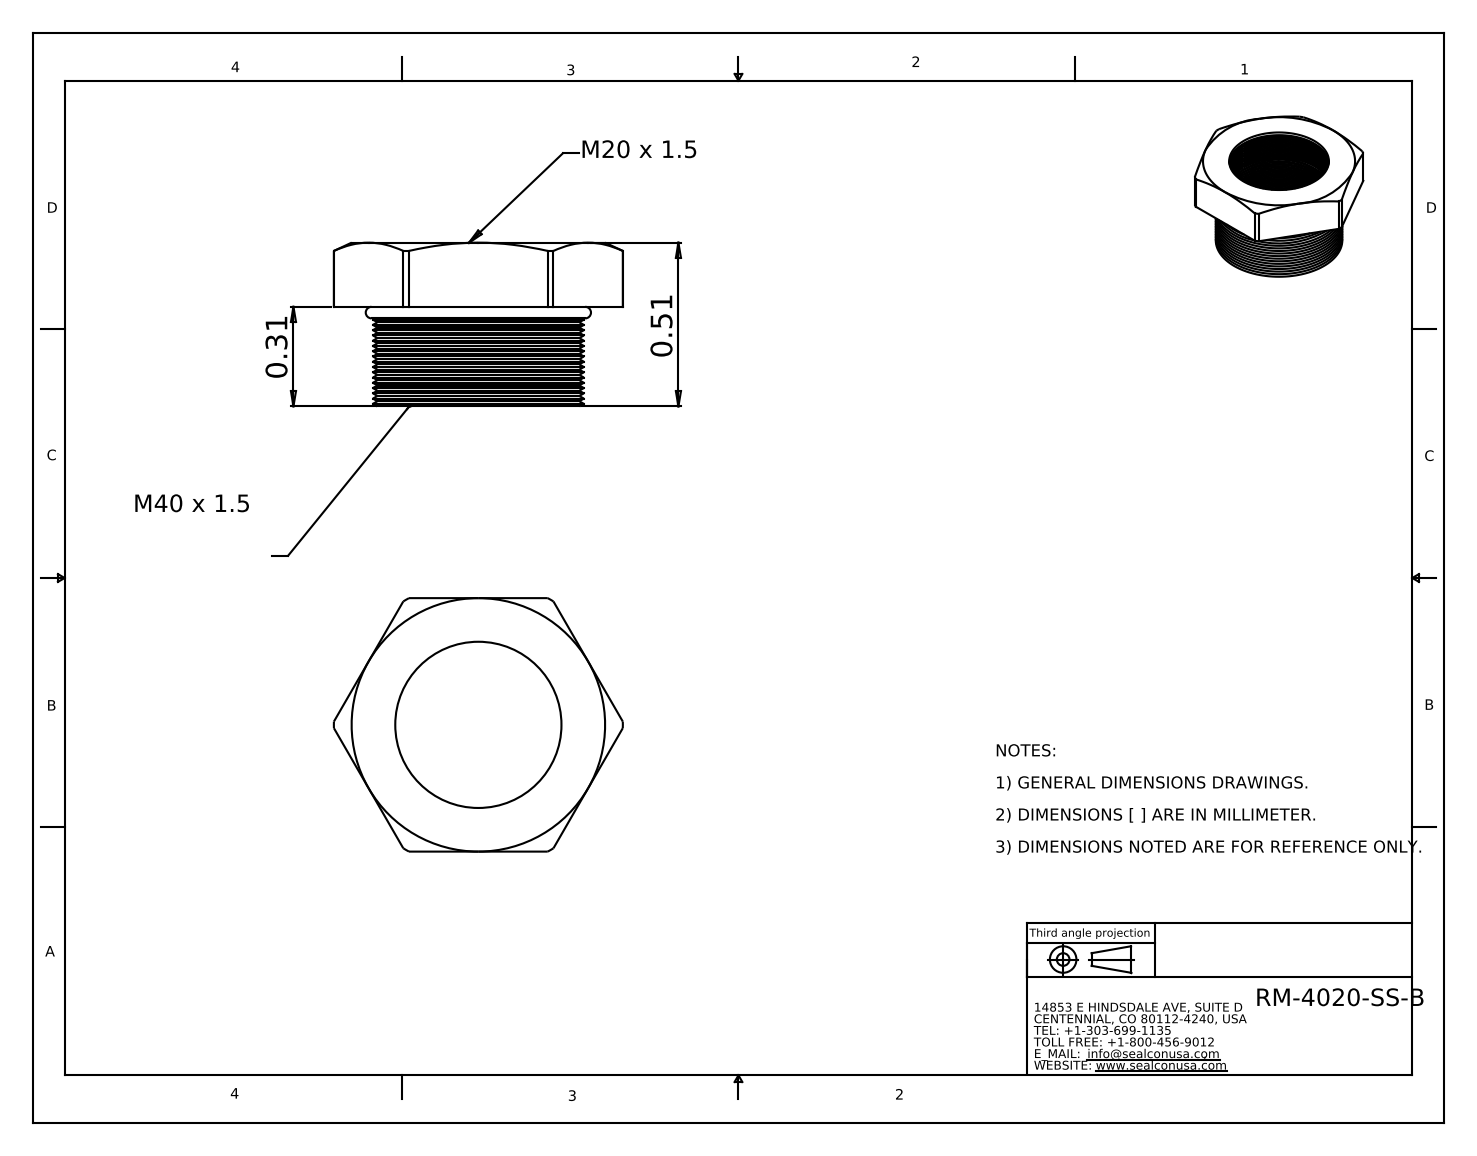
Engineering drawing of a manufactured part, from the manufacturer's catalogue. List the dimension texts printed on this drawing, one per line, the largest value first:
0.51
0.31
